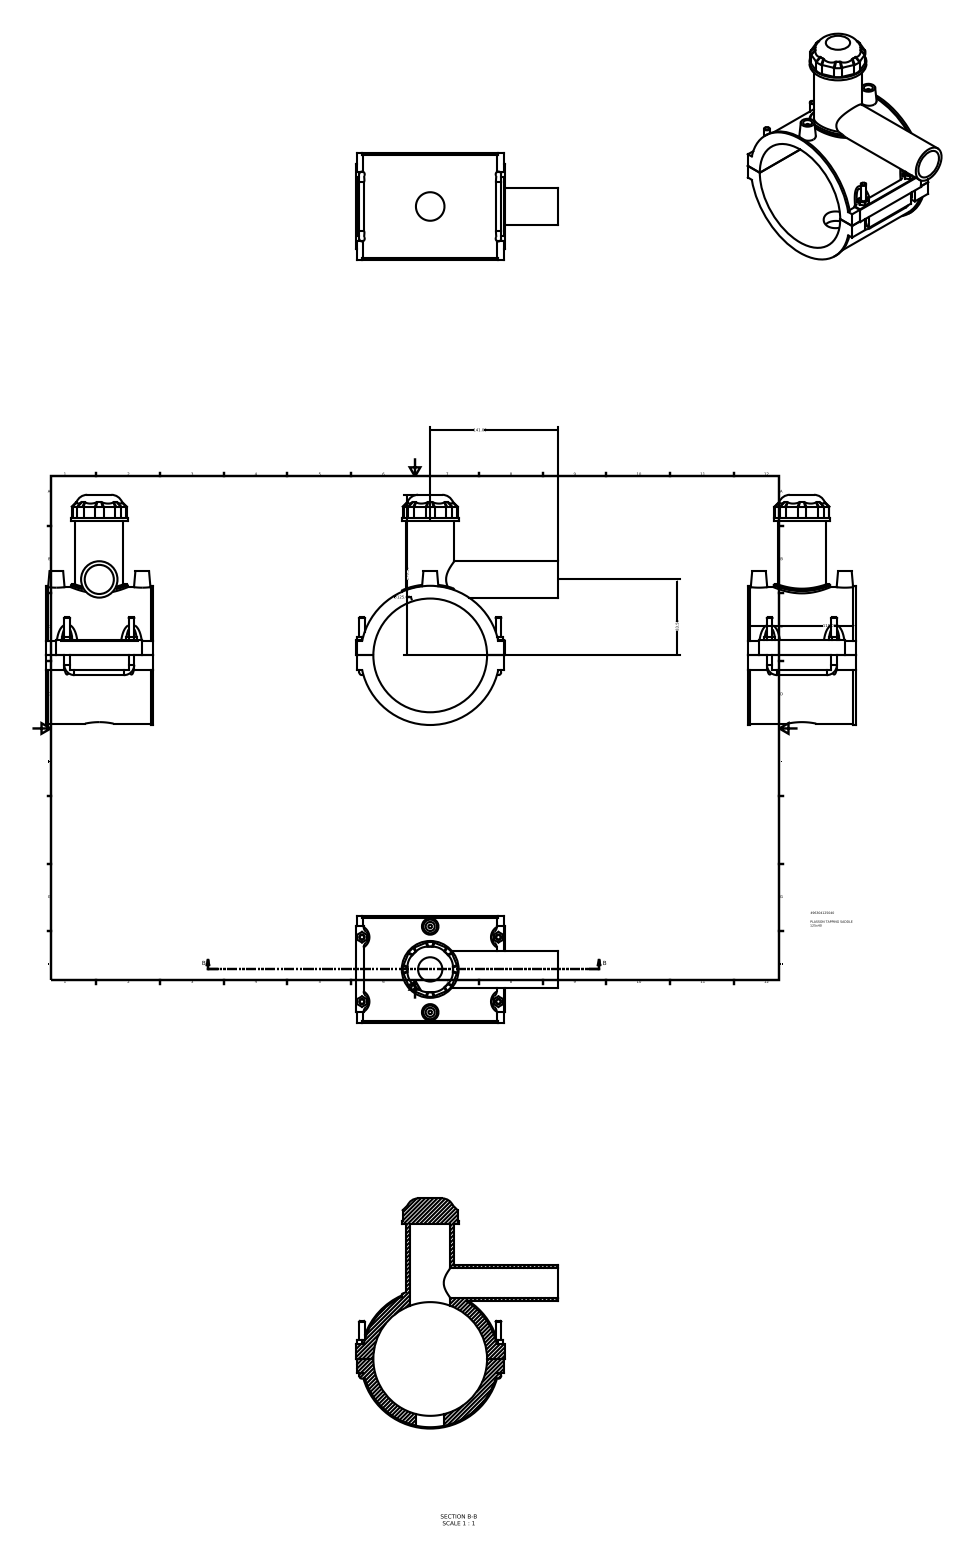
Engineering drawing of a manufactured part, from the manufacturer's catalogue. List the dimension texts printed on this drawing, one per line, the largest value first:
176.50
141.00
∅125.00
118.00
83.50
